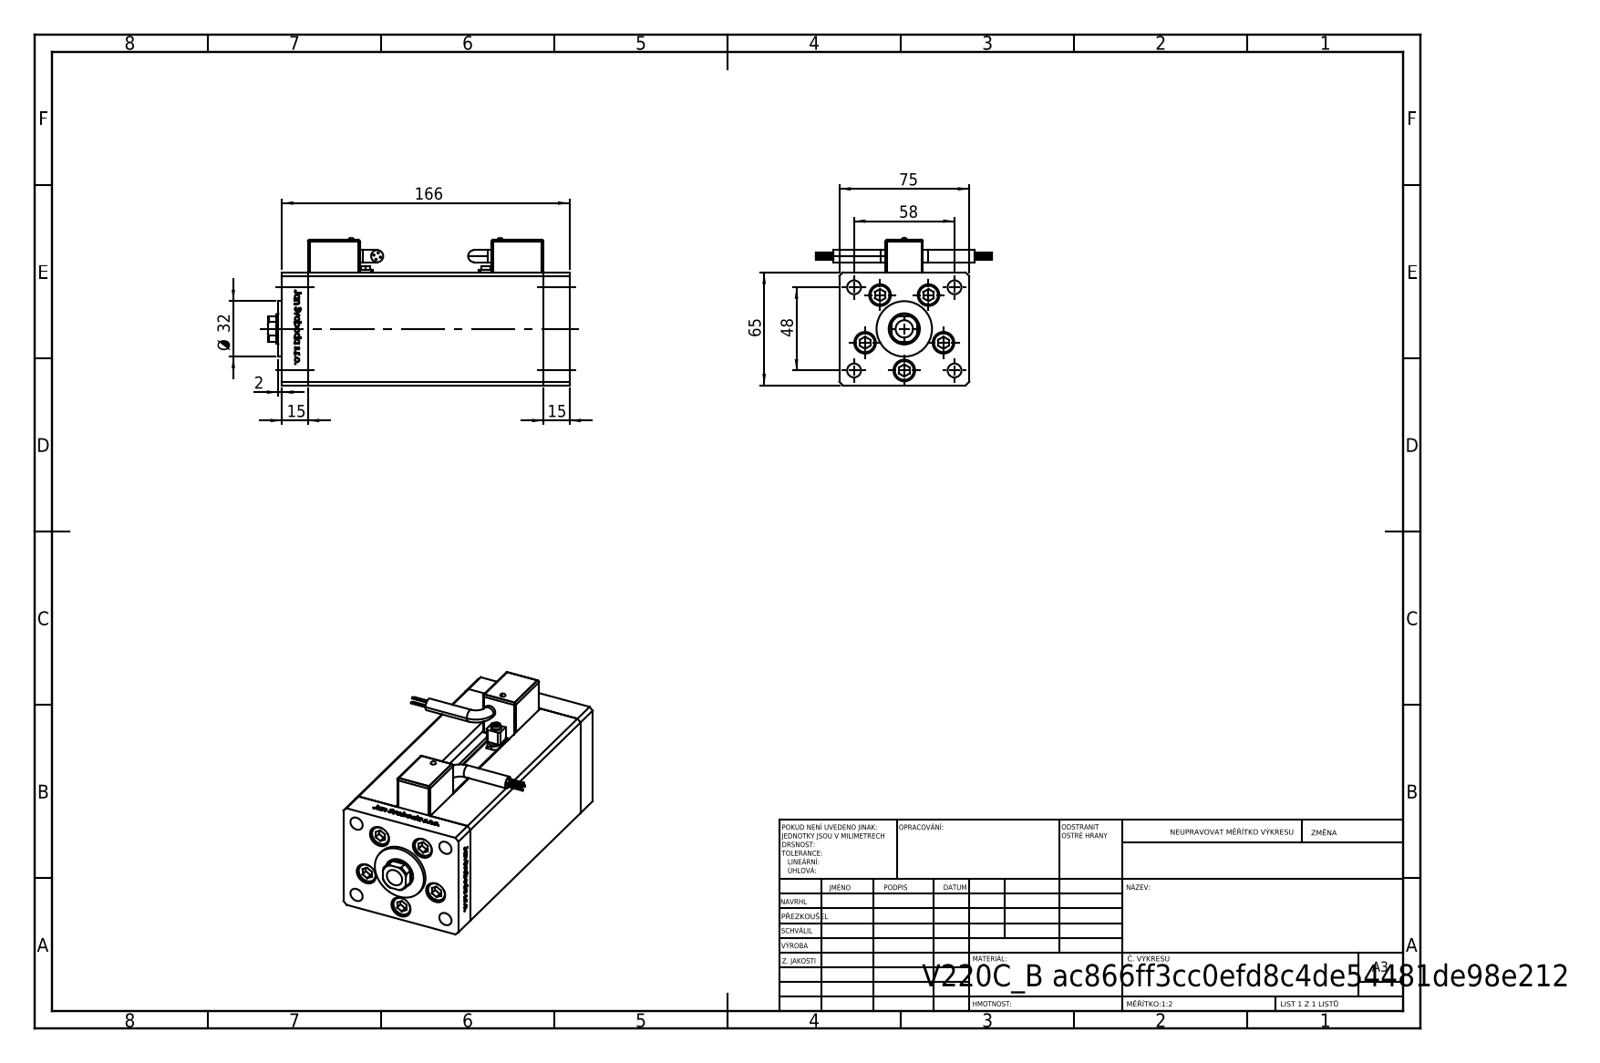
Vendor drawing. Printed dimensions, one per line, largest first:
166
75
65
58
48
Ø 32
15
15
2
